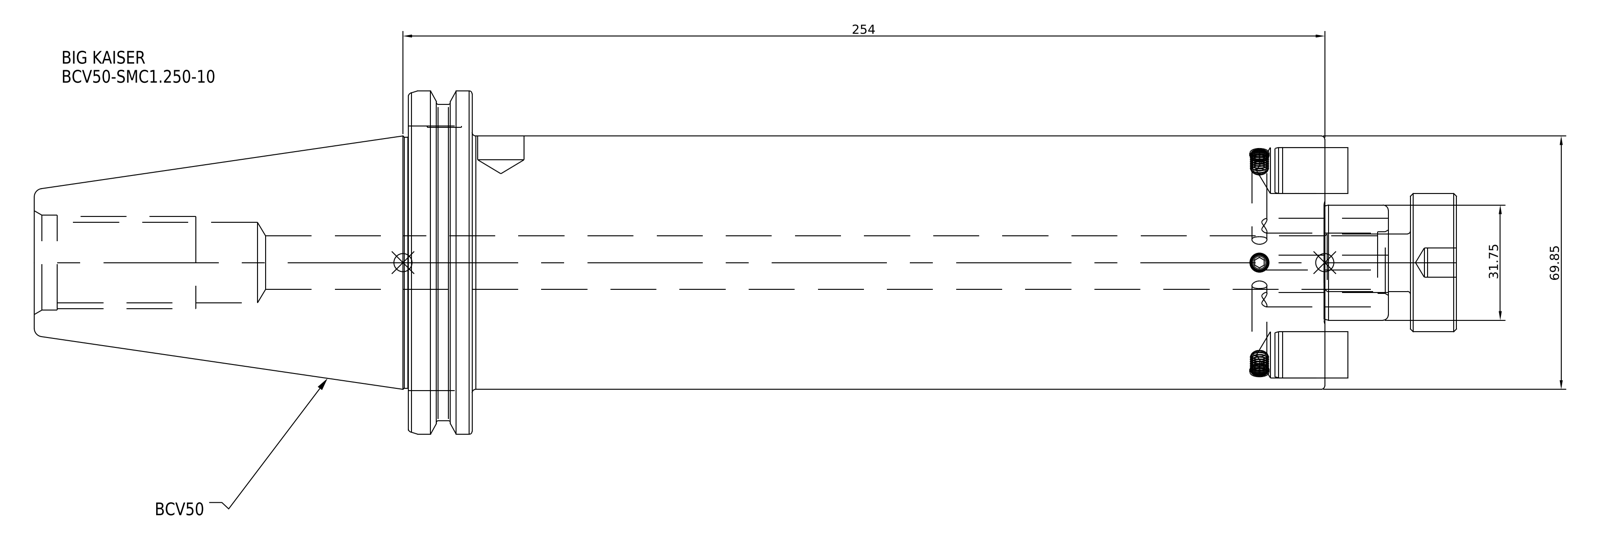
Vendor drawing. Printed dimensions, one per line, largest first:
254
69.85
31.75
